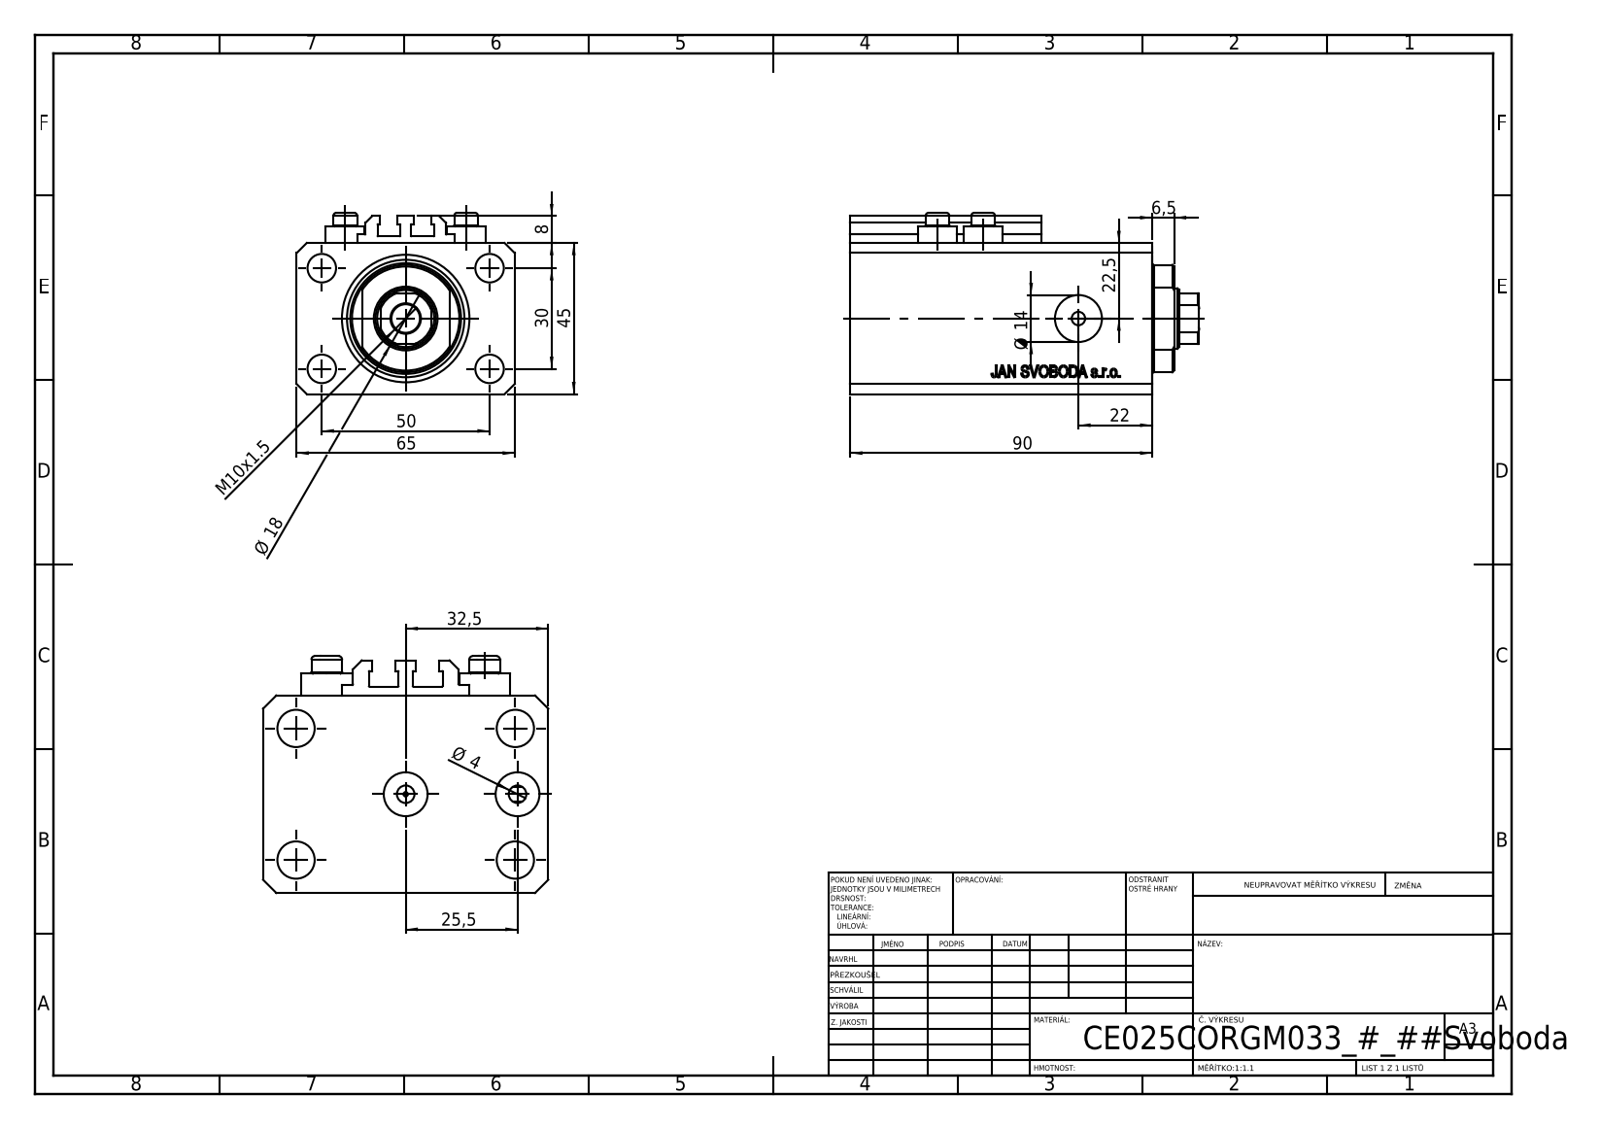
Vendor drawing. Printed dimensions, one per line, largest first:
90
65
50
45
32,5
30
25,5
22,5
22
Ø 18
Ø 14
M10x1.5
8
6,5
Ø 4
